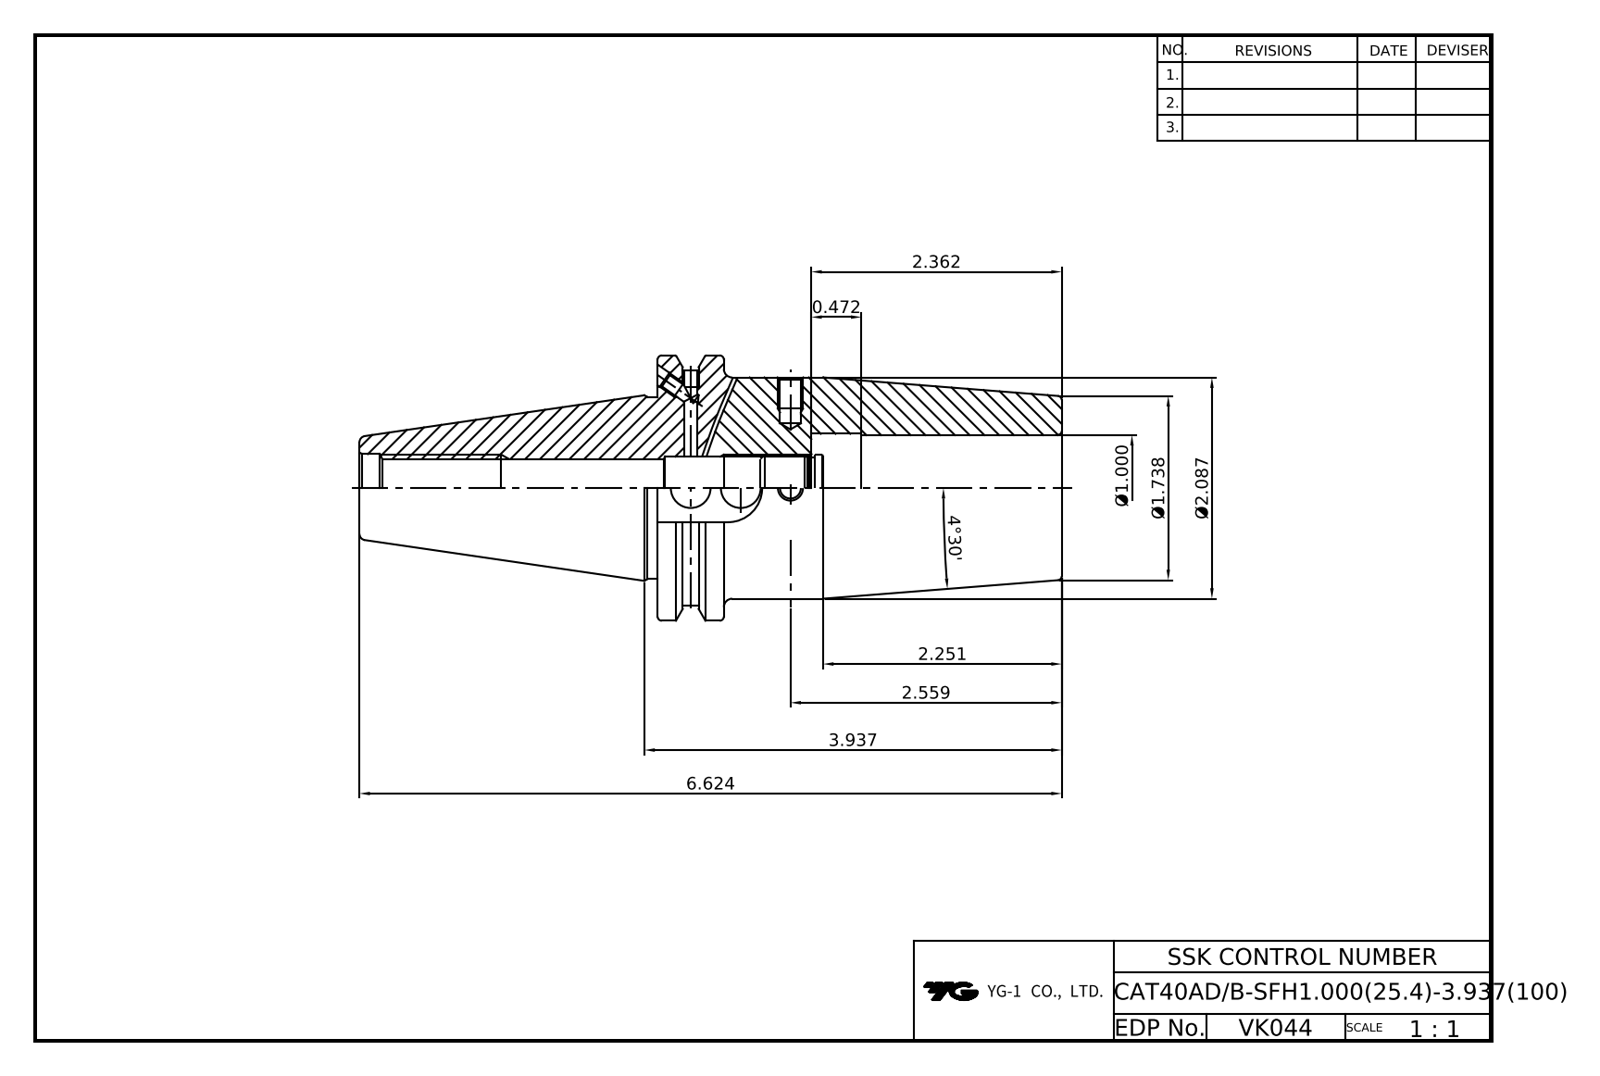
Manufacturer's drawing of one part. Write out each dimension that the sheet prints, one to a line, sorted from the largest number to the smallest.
6.624
4°30'
3.937
2.559
2.362
2.251
Ø2.087
Ø1.738
Ø1.000
0.472
